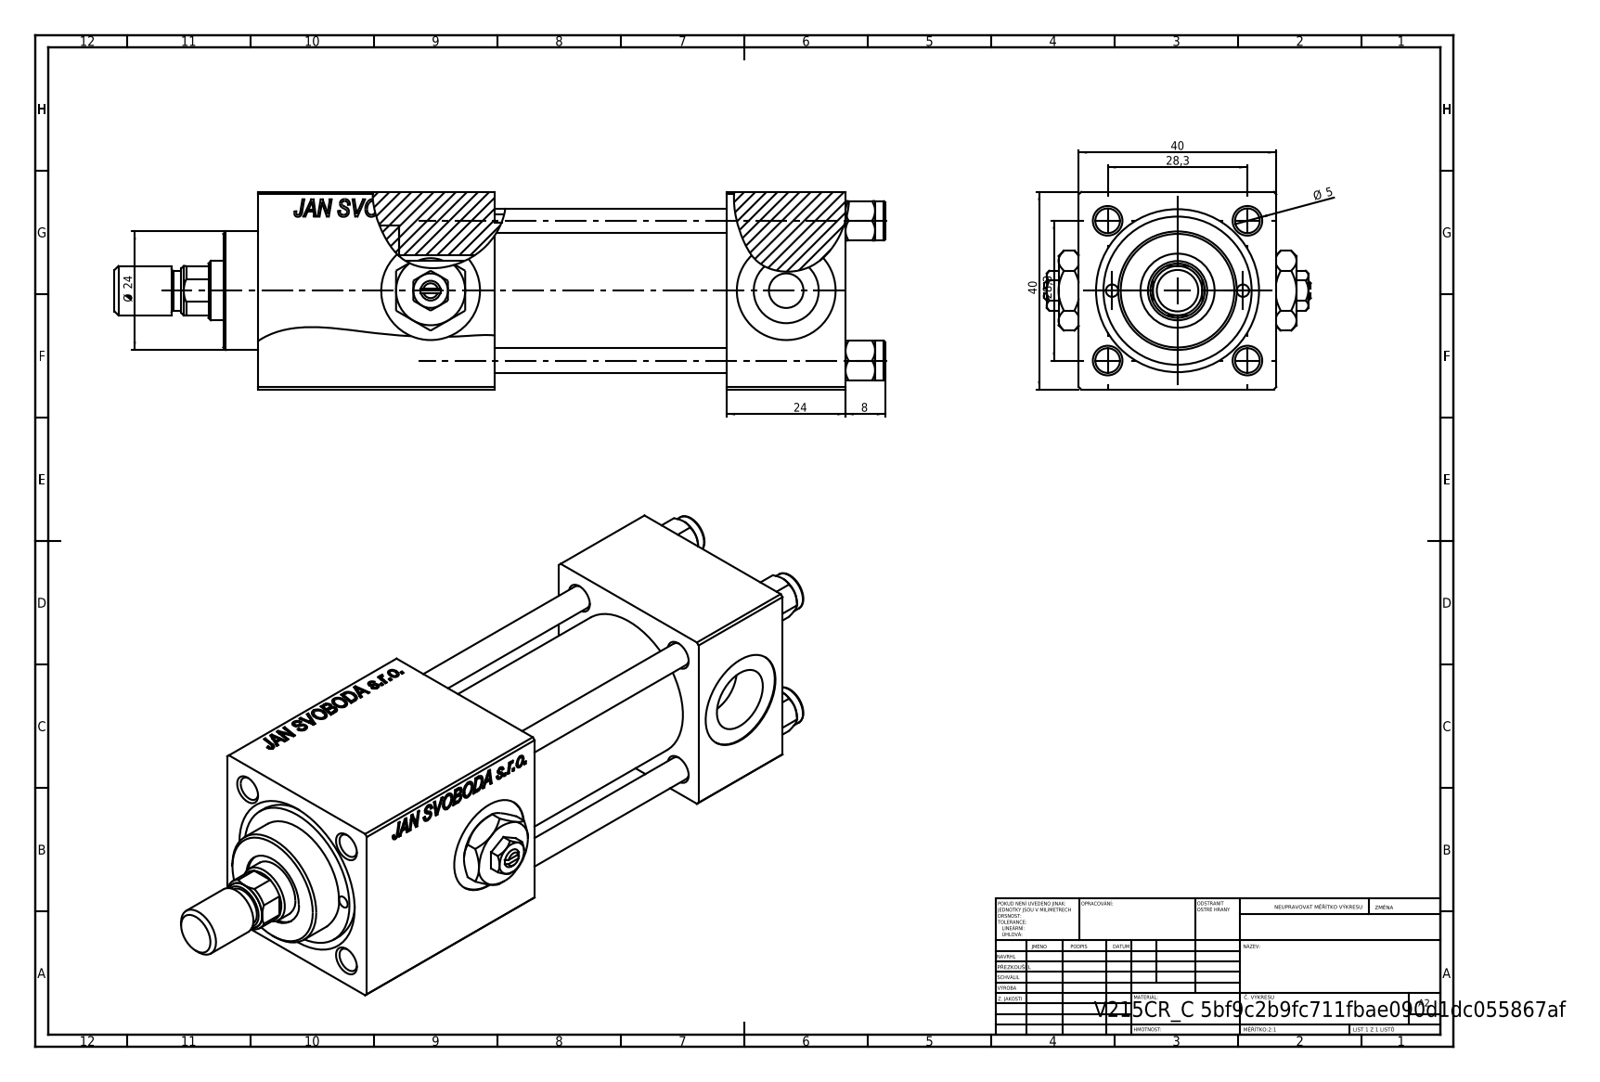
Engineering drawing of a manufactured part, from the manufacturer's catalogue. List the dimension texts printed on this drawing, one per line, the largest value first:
40
40
28,3
28,3
24
Ø 24
8
Ø 5
